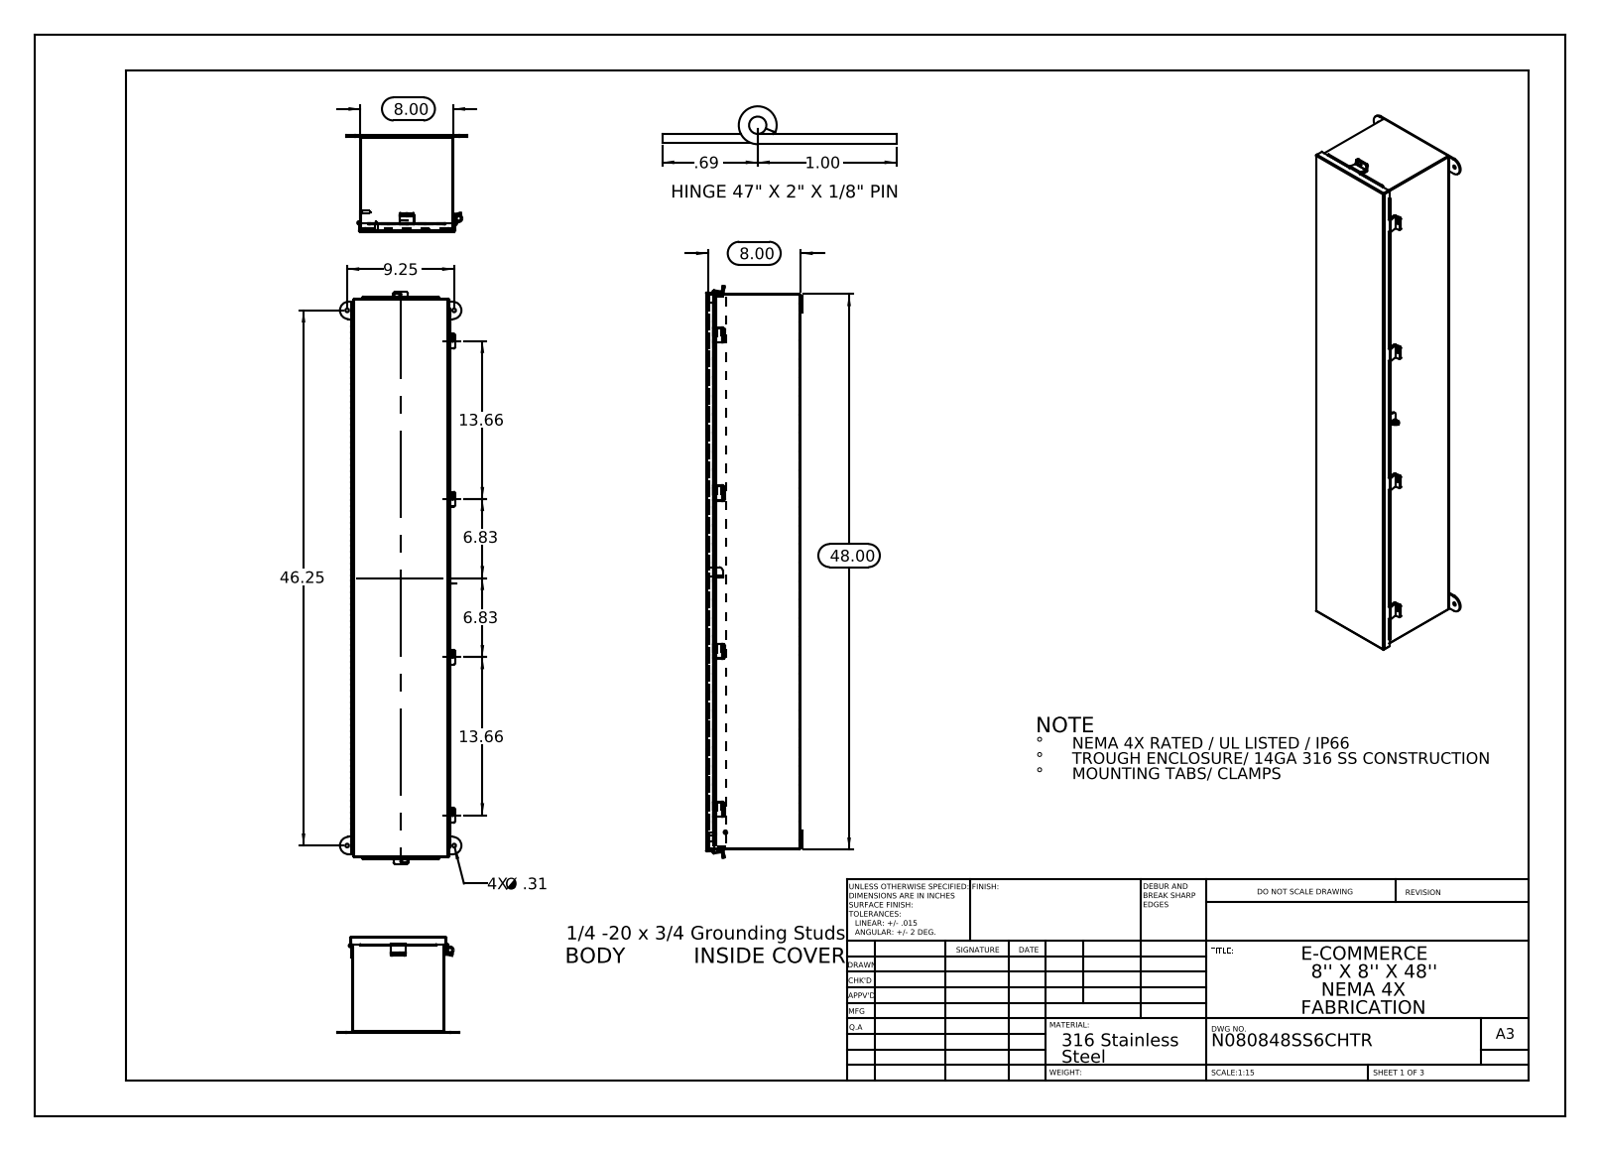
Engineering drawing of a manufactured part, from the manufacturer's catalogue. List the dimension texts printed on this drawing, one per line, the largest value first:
48.00
46.25
13.66
13.66
9.25
8.00
8.00
6.83
6.83
1.00
.69
4X Ø .31
